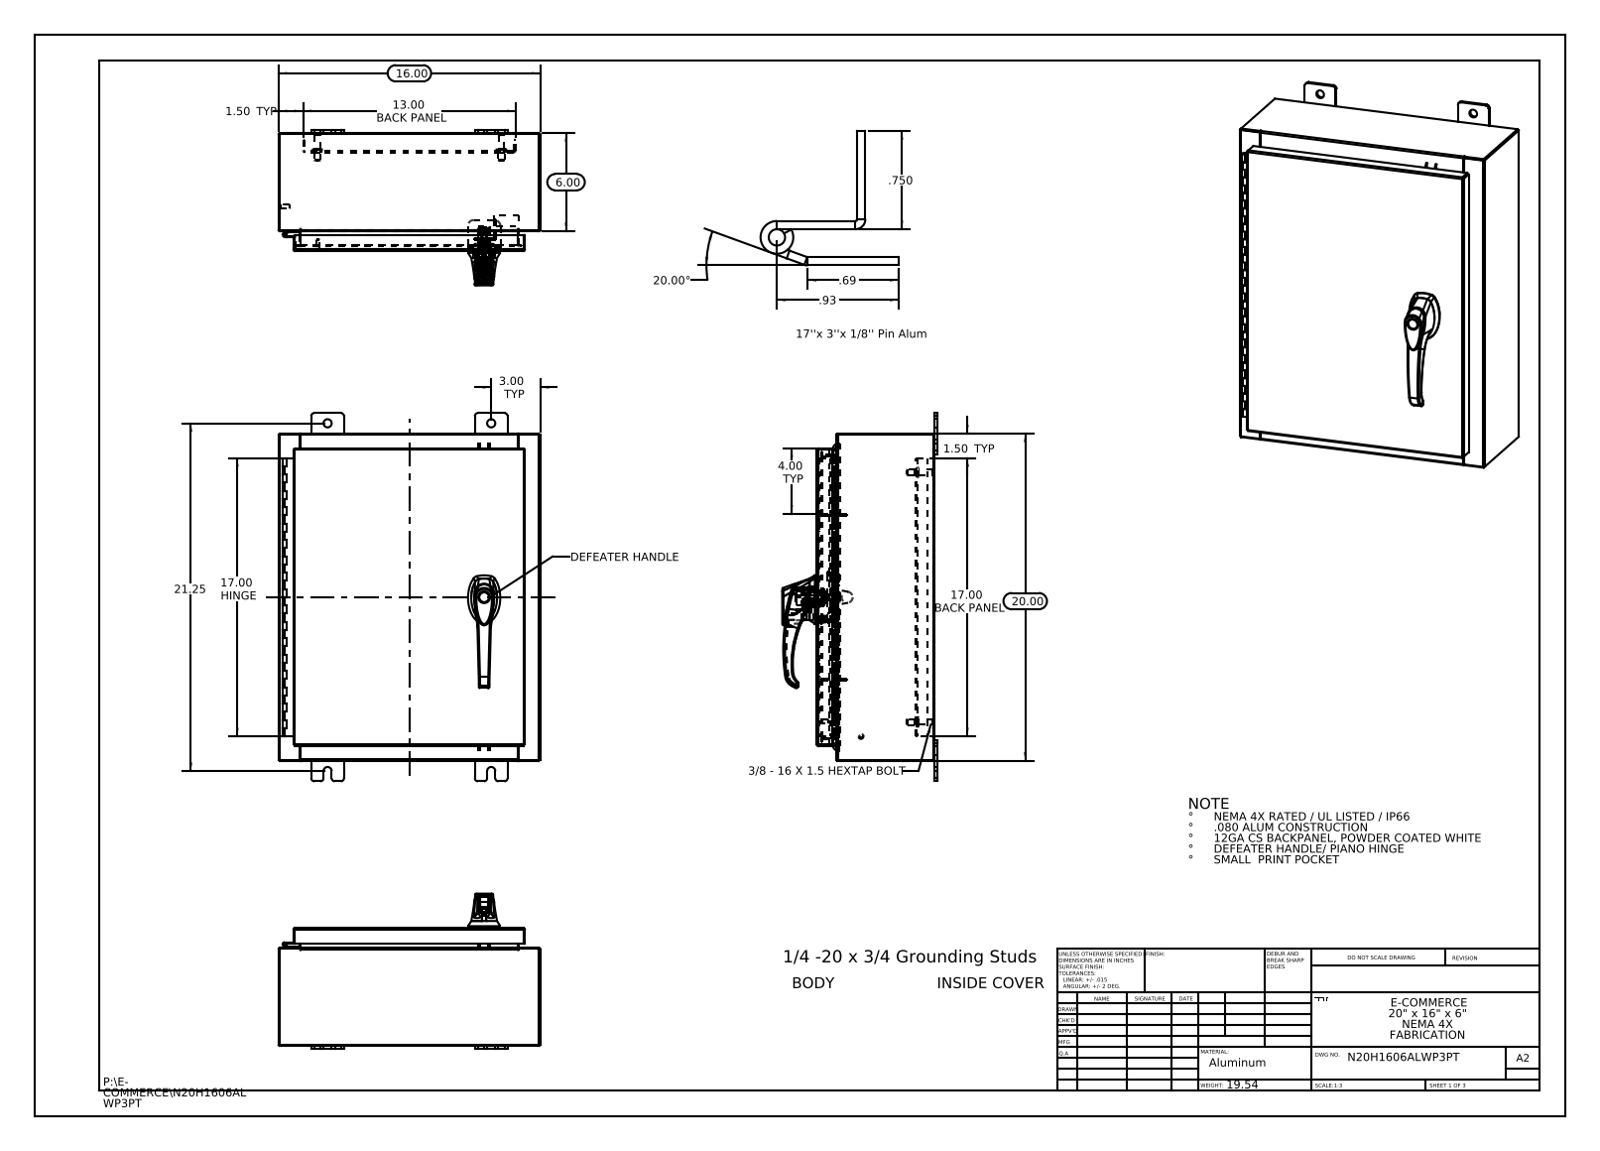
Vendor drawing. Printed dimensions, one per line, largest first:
21.25
20.00
20.00°
17.00 HINGE
17.00 BACK PANEL
16.00
13.00 BACK PANEL
6.00
4.00 TYP
3.00 TYP
1.50 TYP
1.50 TYP
.93
.750
.69
